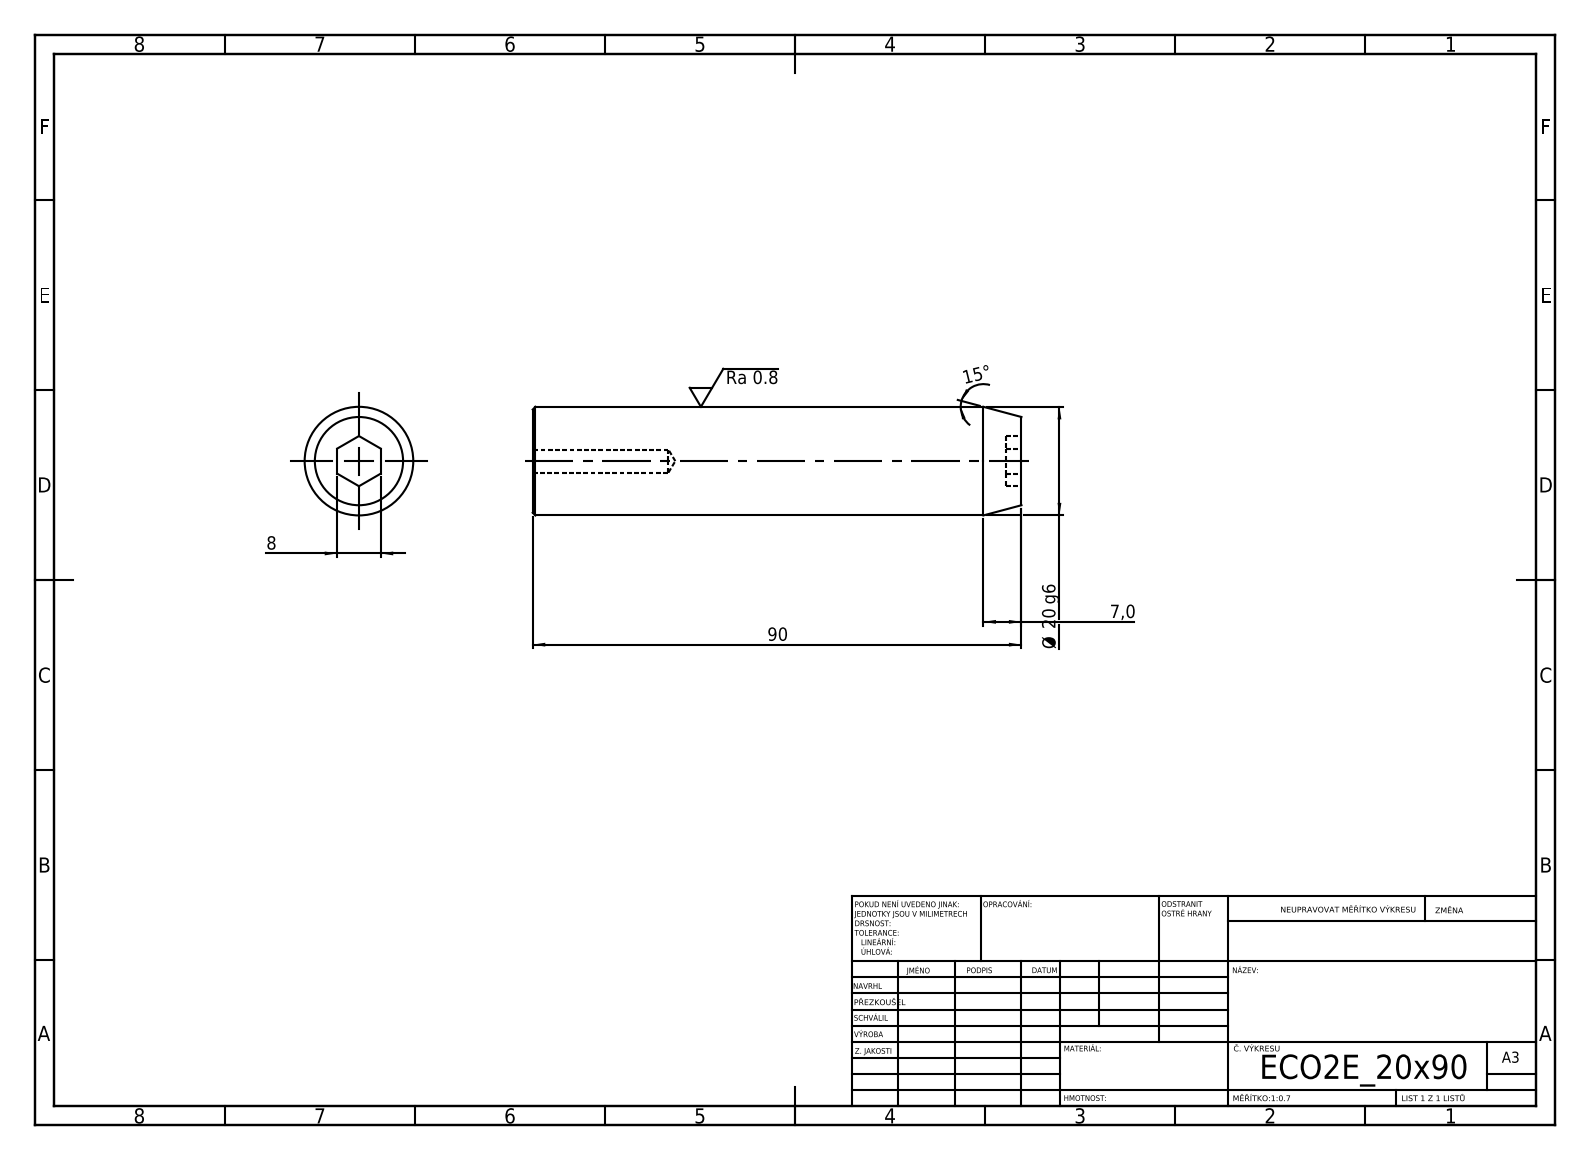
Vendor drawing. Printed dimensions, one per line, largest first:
90
Ø 20 g6
15°
8
7,0
